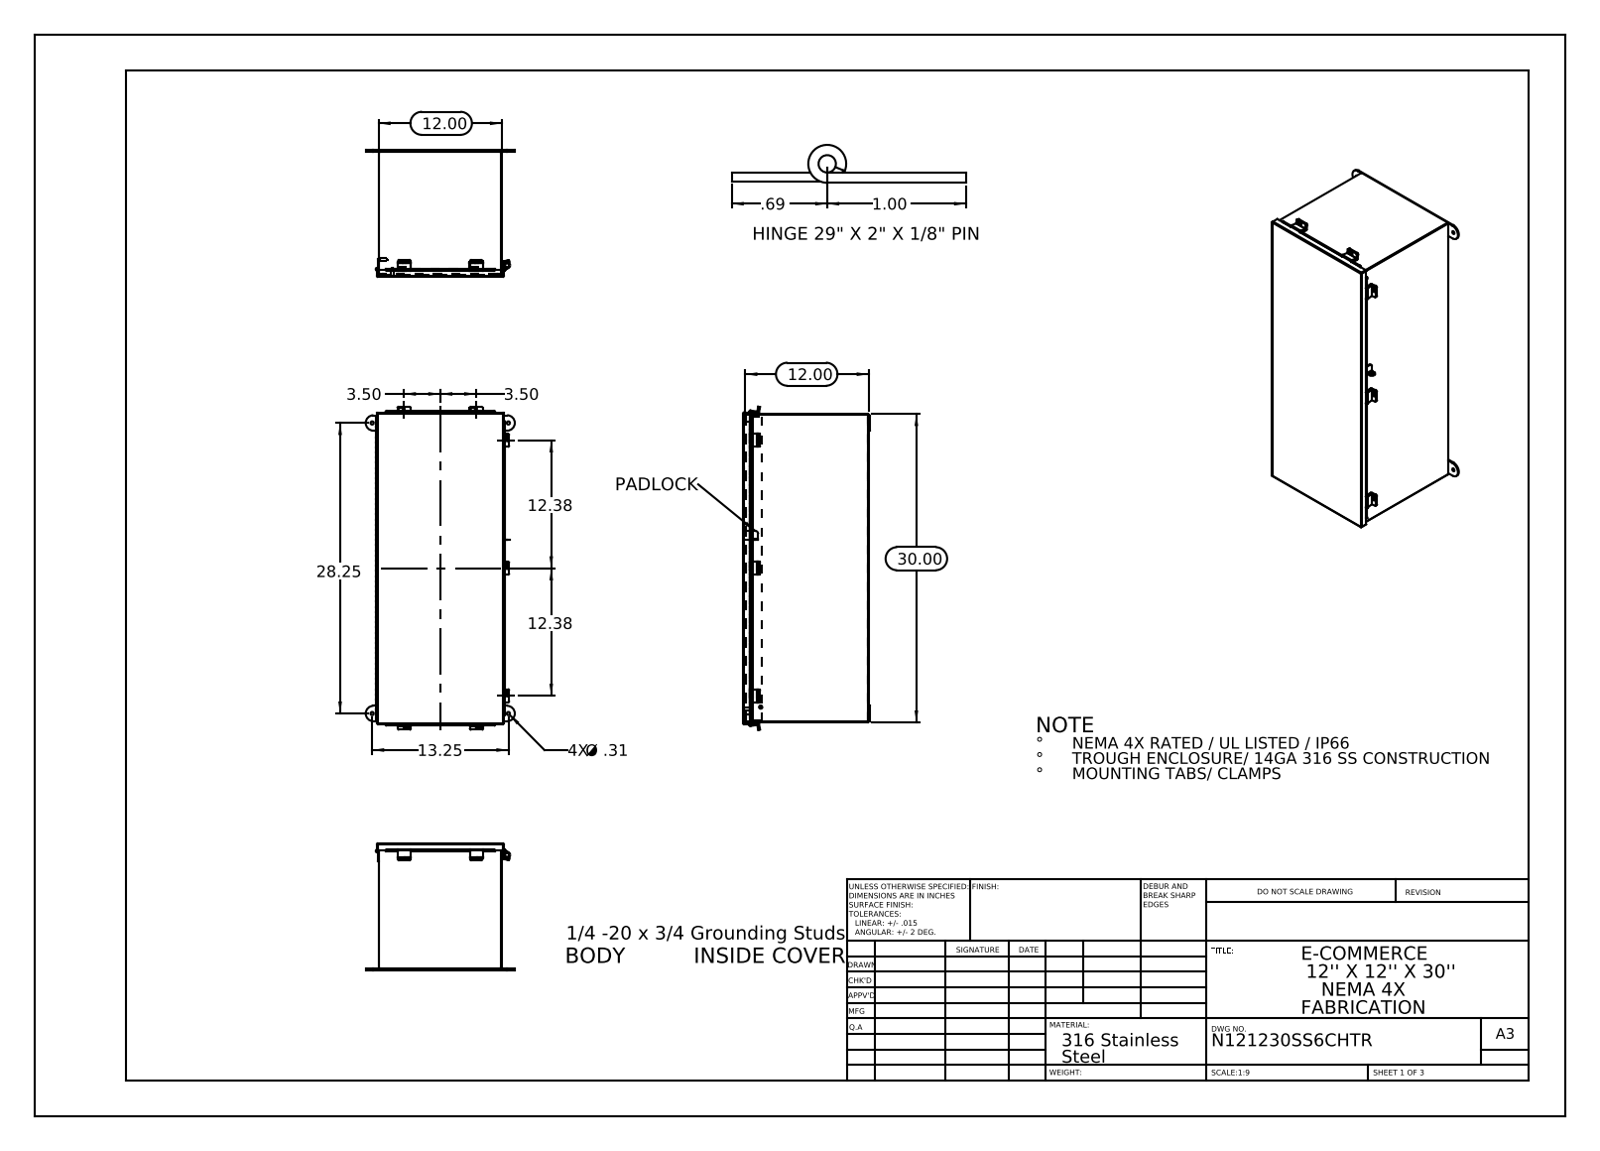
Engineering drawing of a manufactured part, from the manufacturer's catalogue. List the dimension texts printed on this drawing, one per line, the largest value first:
30.00
28.25
13.25
12.38
12.38
12.00
12.00
3.50
3.50
1.00
.69
4X Ø .31
